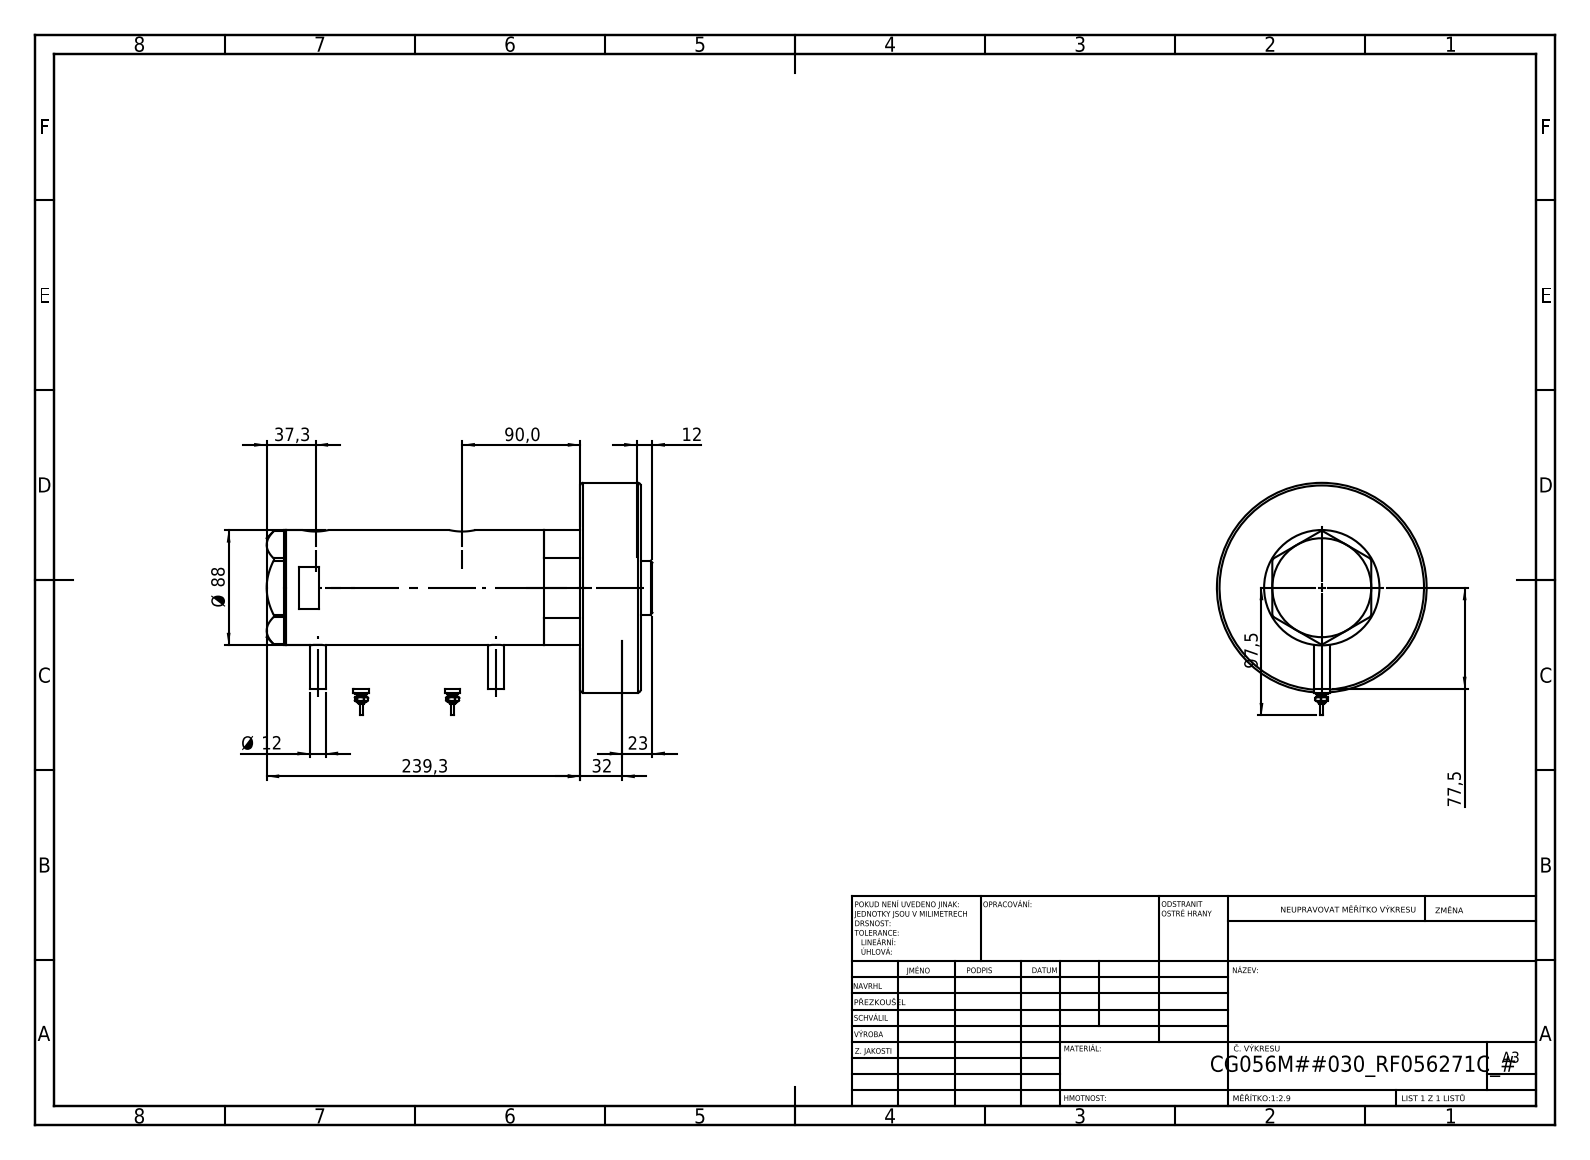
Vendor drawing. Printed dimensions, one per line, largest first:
239,3
97,5
90,0
Ø 88
77,5
37,3
32
23
12
Ø 12
